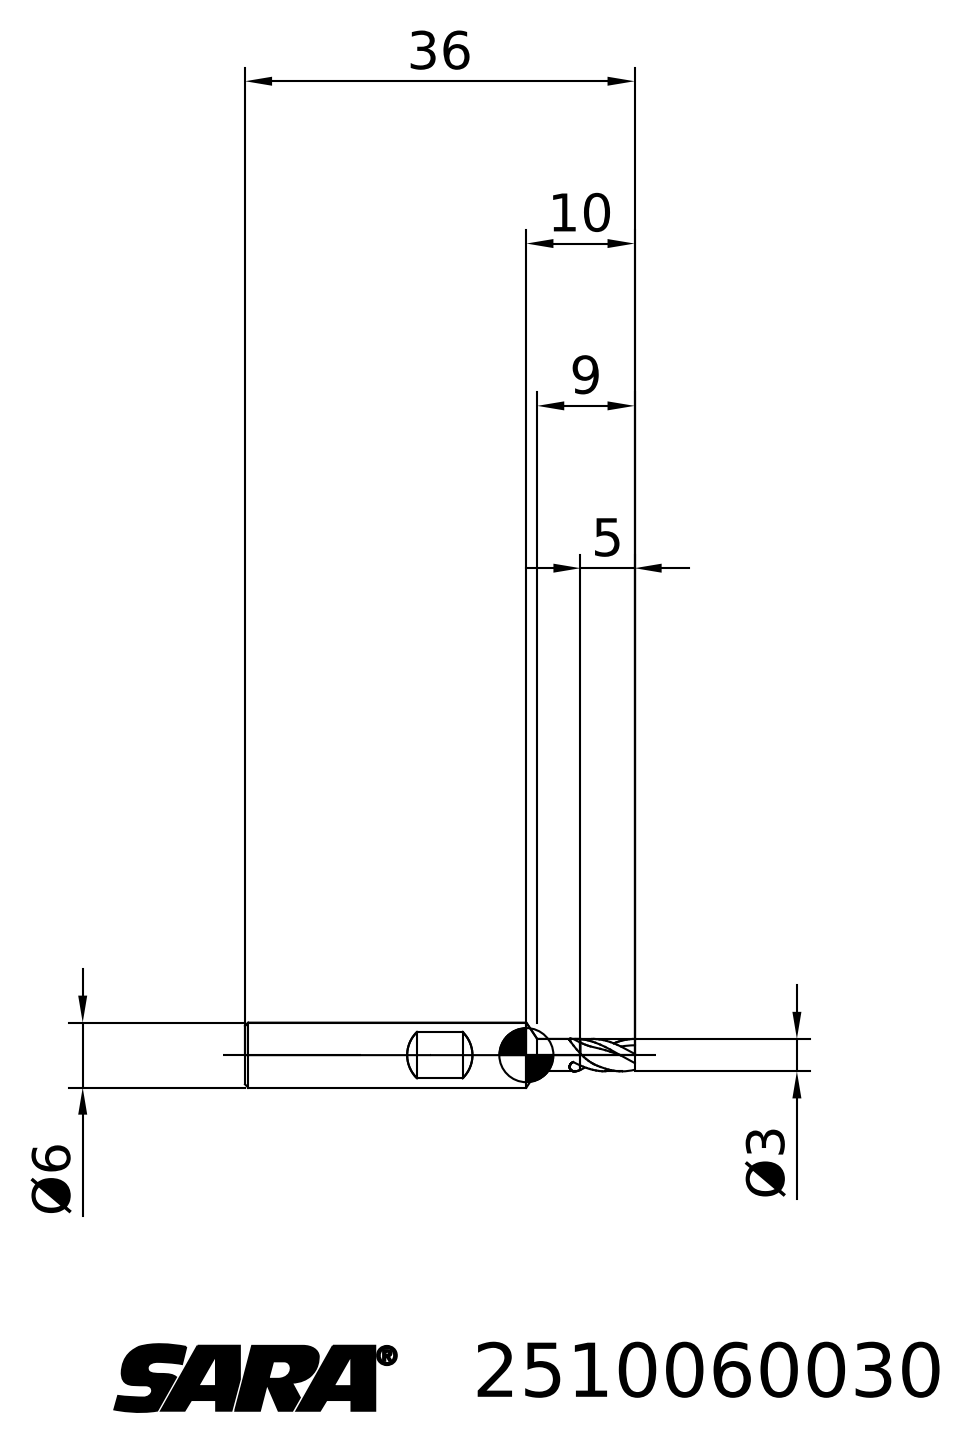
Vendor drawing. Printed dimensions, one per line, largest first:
36
10
9
Ø6
5
Ø3
